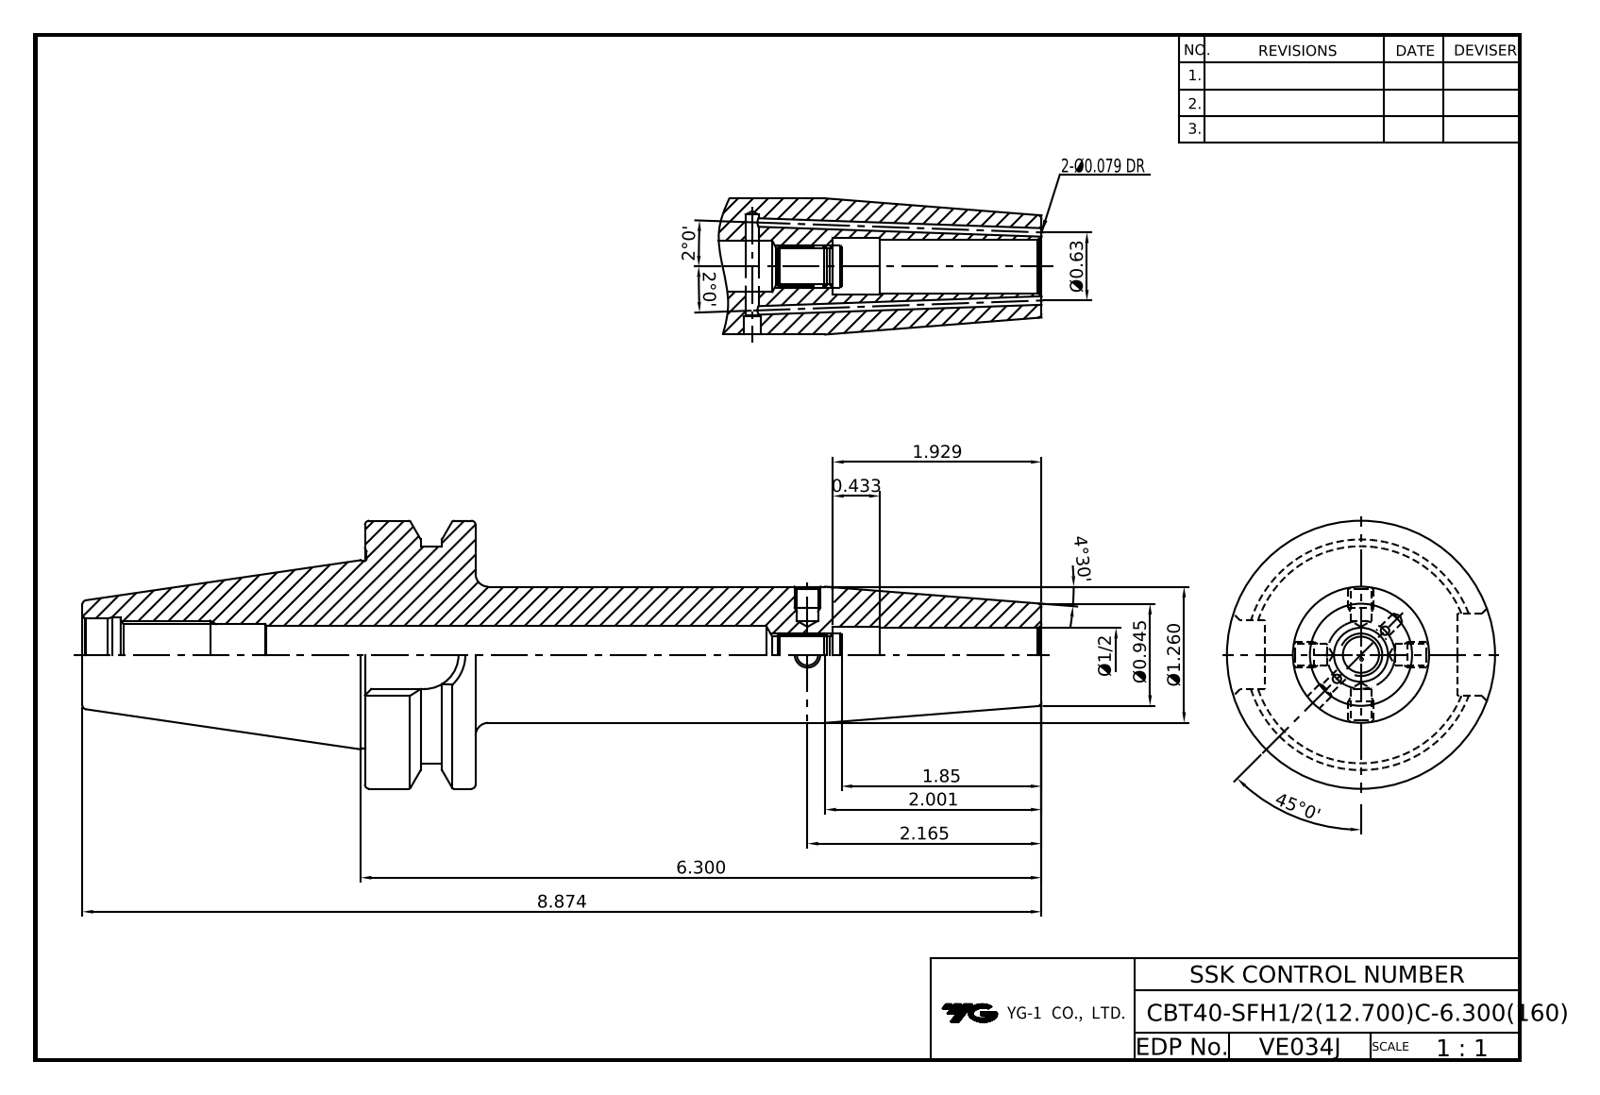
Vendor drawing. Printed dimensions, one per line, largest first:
45°0'
8.874
6.300
4°30'
2.165
2.001
2°0'
2°0'
1.929
1.85
Ø1.260
Ø0.945
Ø0.63
0.433
